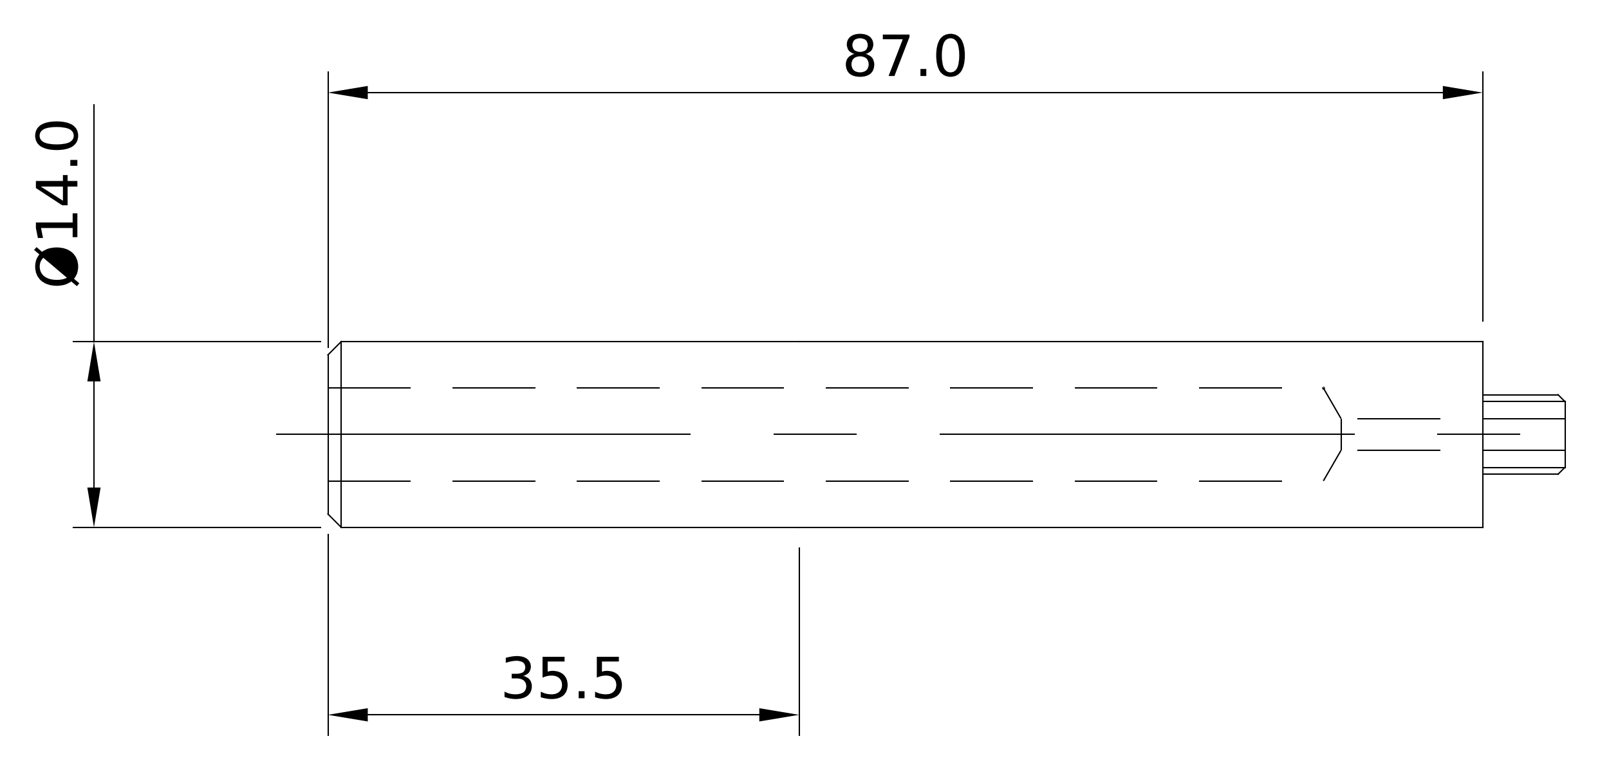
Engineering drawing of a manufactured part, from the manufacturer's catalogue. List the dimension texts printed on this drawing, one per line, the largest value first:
87.0
35.5
Ø14.0
